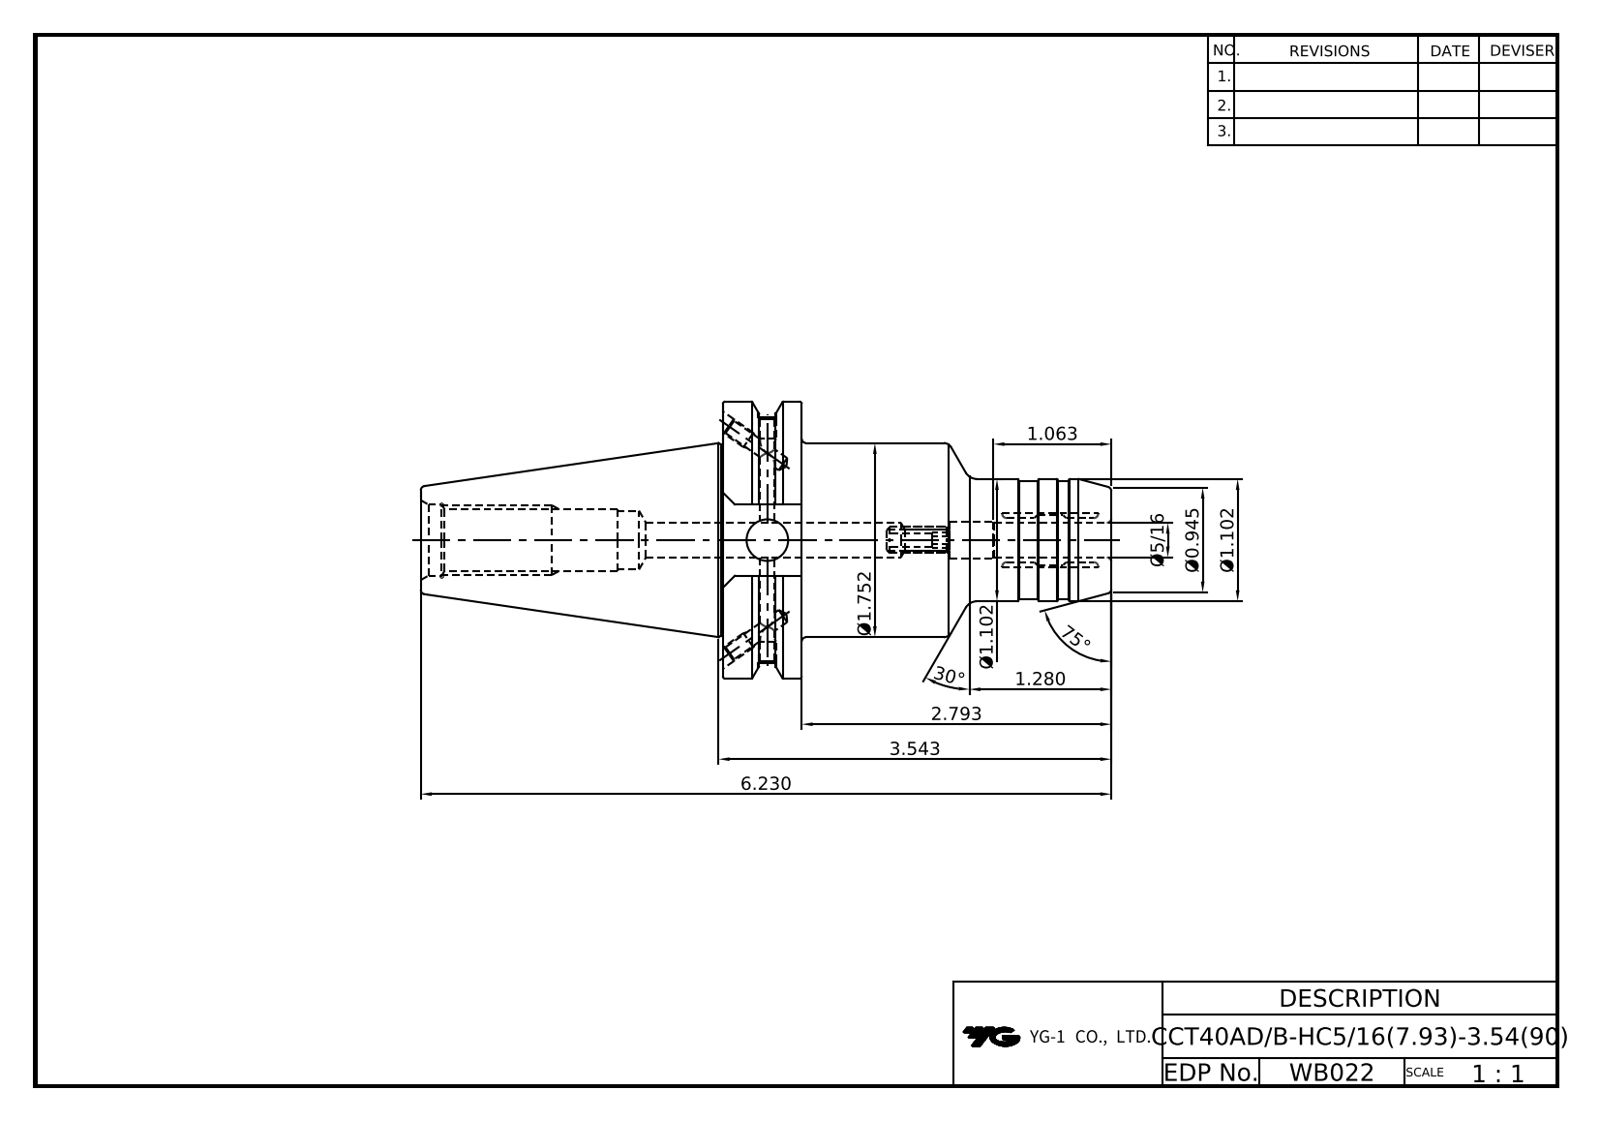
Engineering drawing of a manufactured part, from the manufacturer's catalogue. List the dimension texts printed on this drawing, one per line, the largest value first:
75°
30°
6.230
3.543
2.793
Ø1.752
1.280
Ø1.102
Ø1.102
1.063
Ø0.945
Ø5/16
